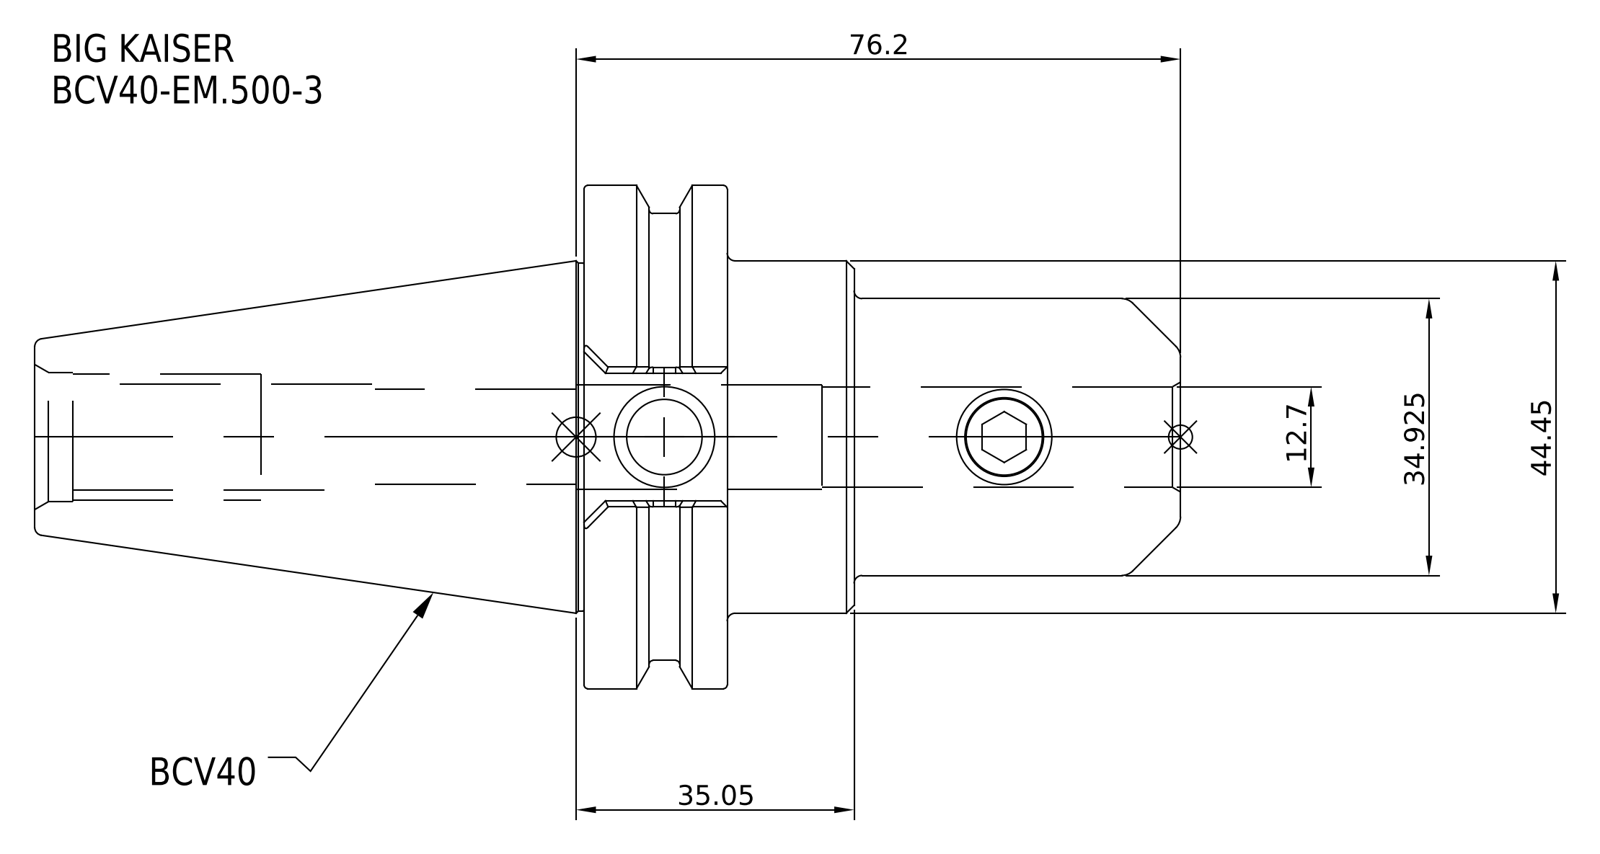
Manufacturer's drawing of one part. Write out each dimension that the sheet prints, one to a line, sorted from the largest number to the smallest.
76.2
44.45
35.05
34.925
12.7
